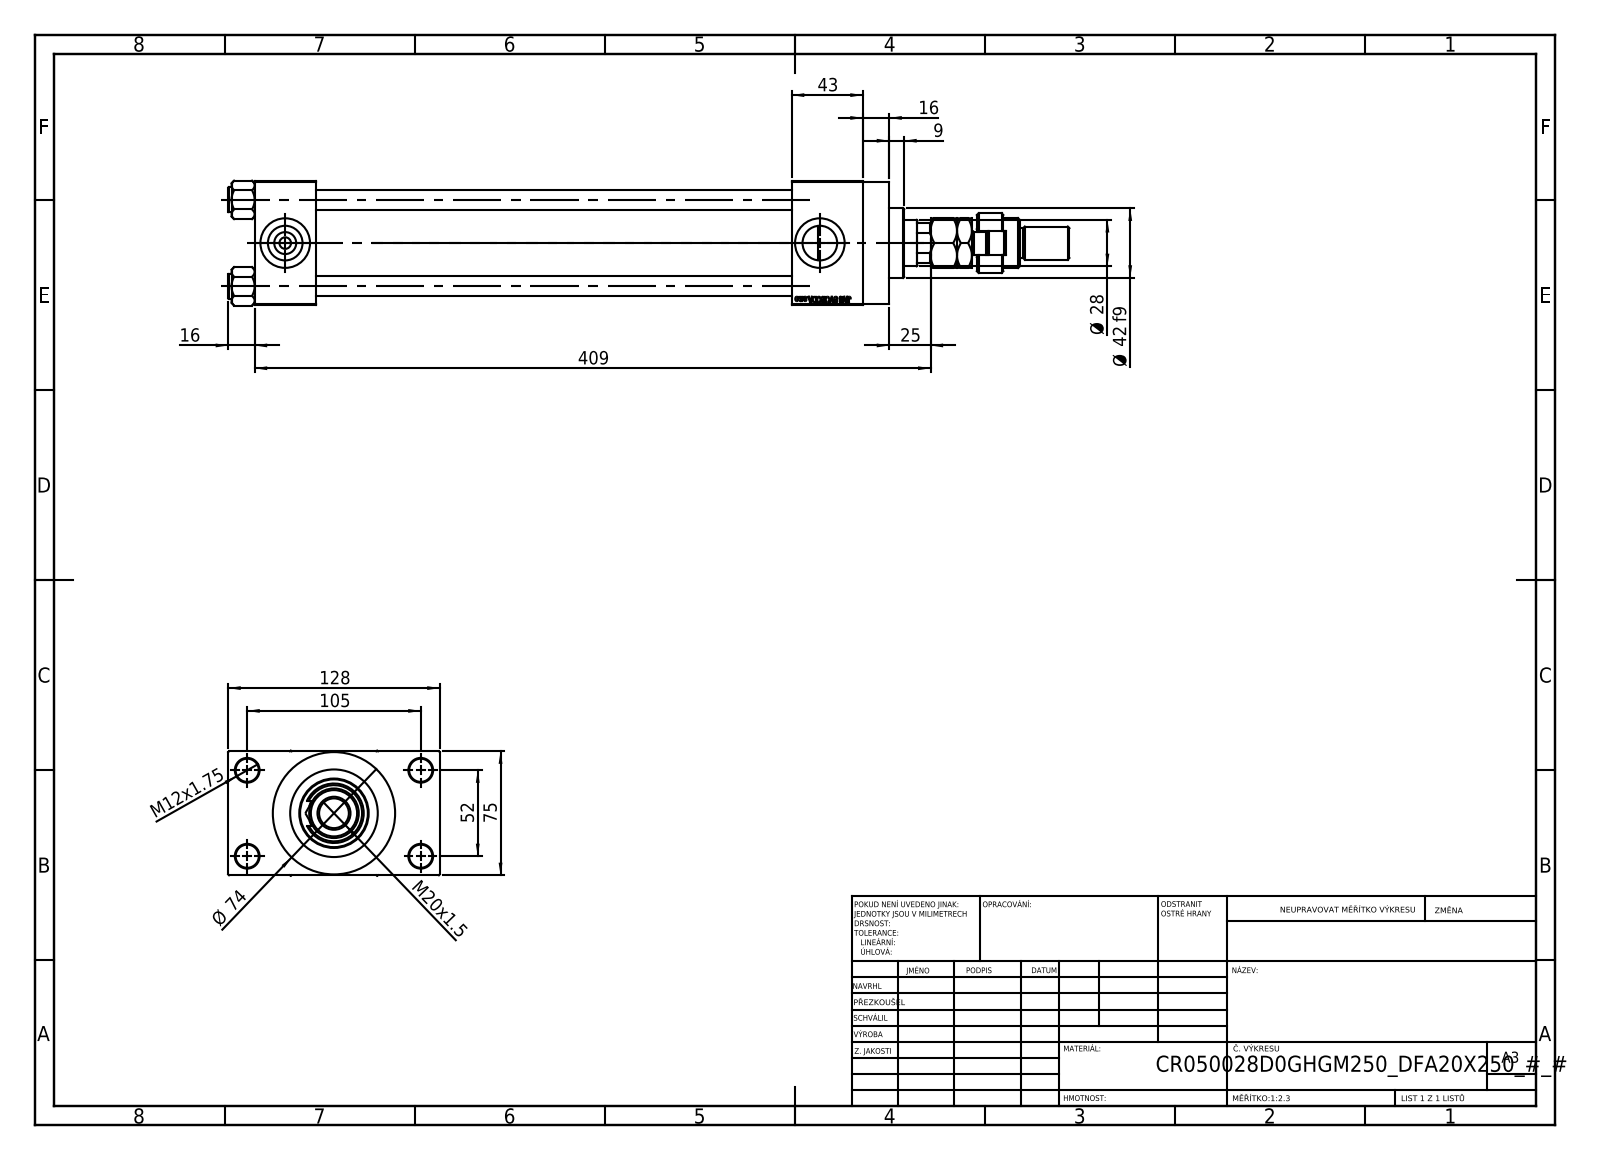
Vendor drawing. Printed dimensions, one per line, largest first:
409
128
105
75
Ø 74
52
43
Ø 42 f9
Ø 28
25
M20x1.5
16
16
M12x1.75
9
